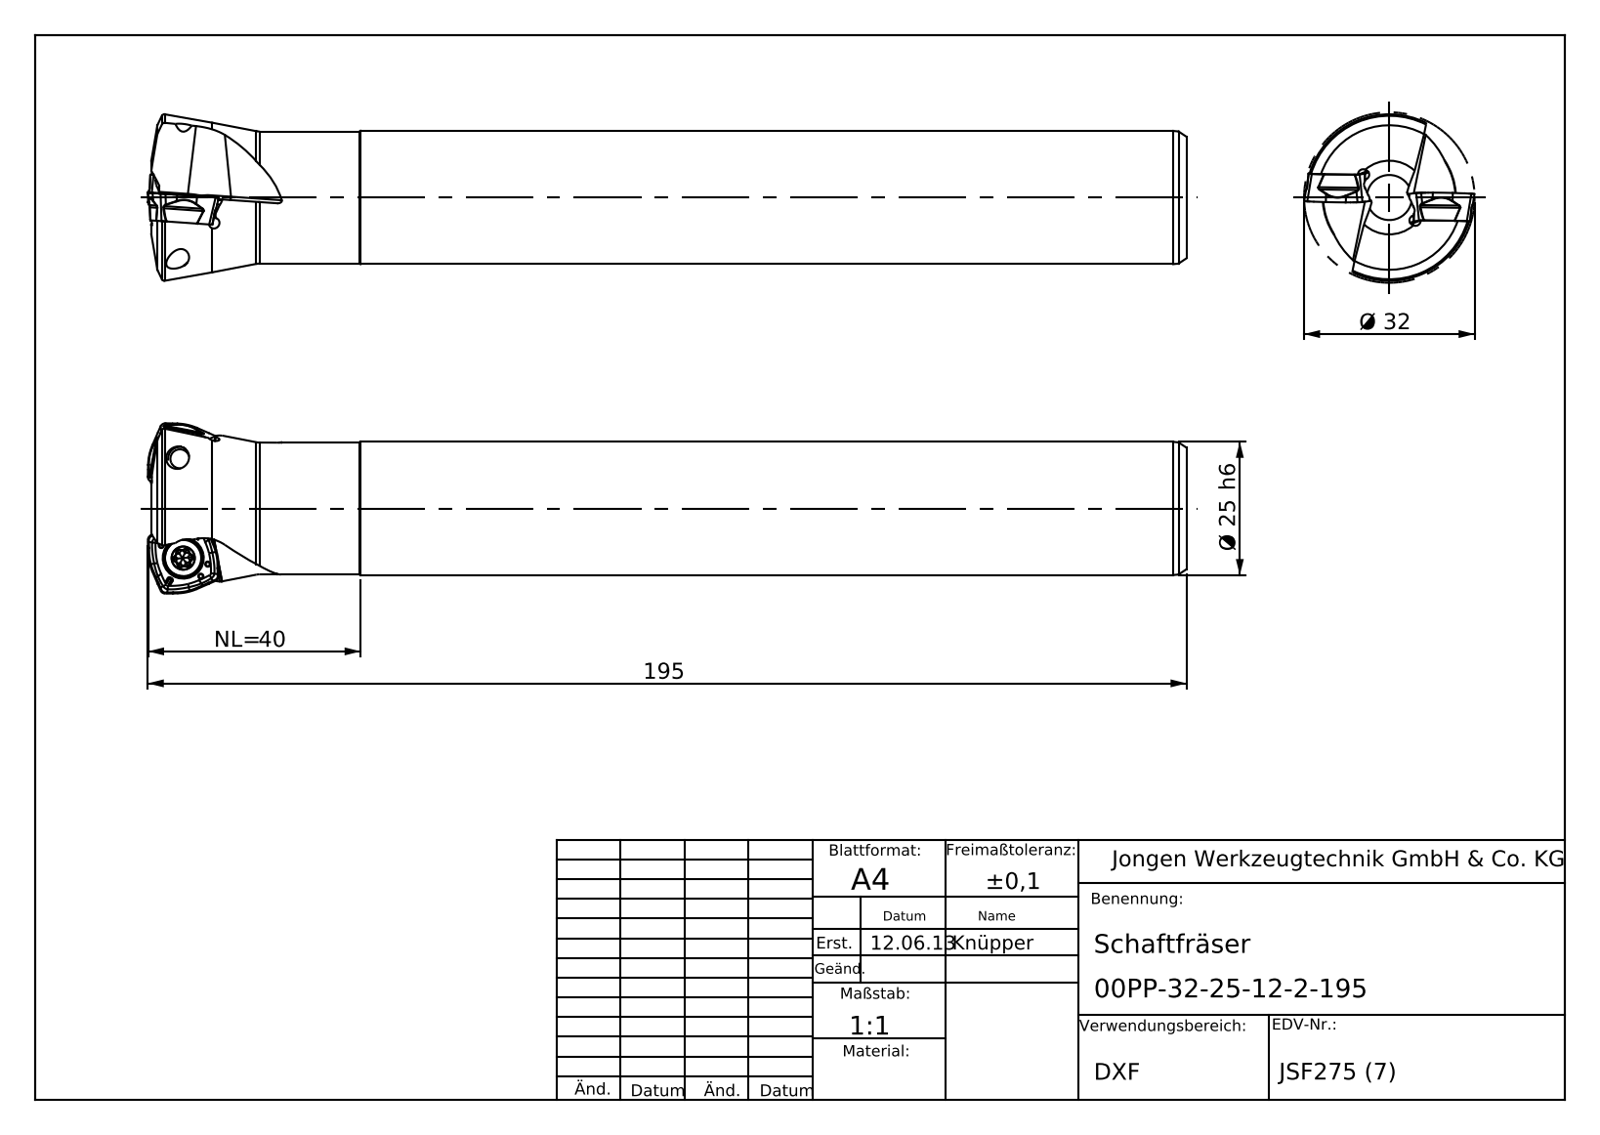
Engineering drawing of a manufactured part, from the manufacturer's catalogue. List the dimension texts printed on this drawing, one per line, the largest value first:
195
NL= 40
Ø 32
Ø 25 h6
